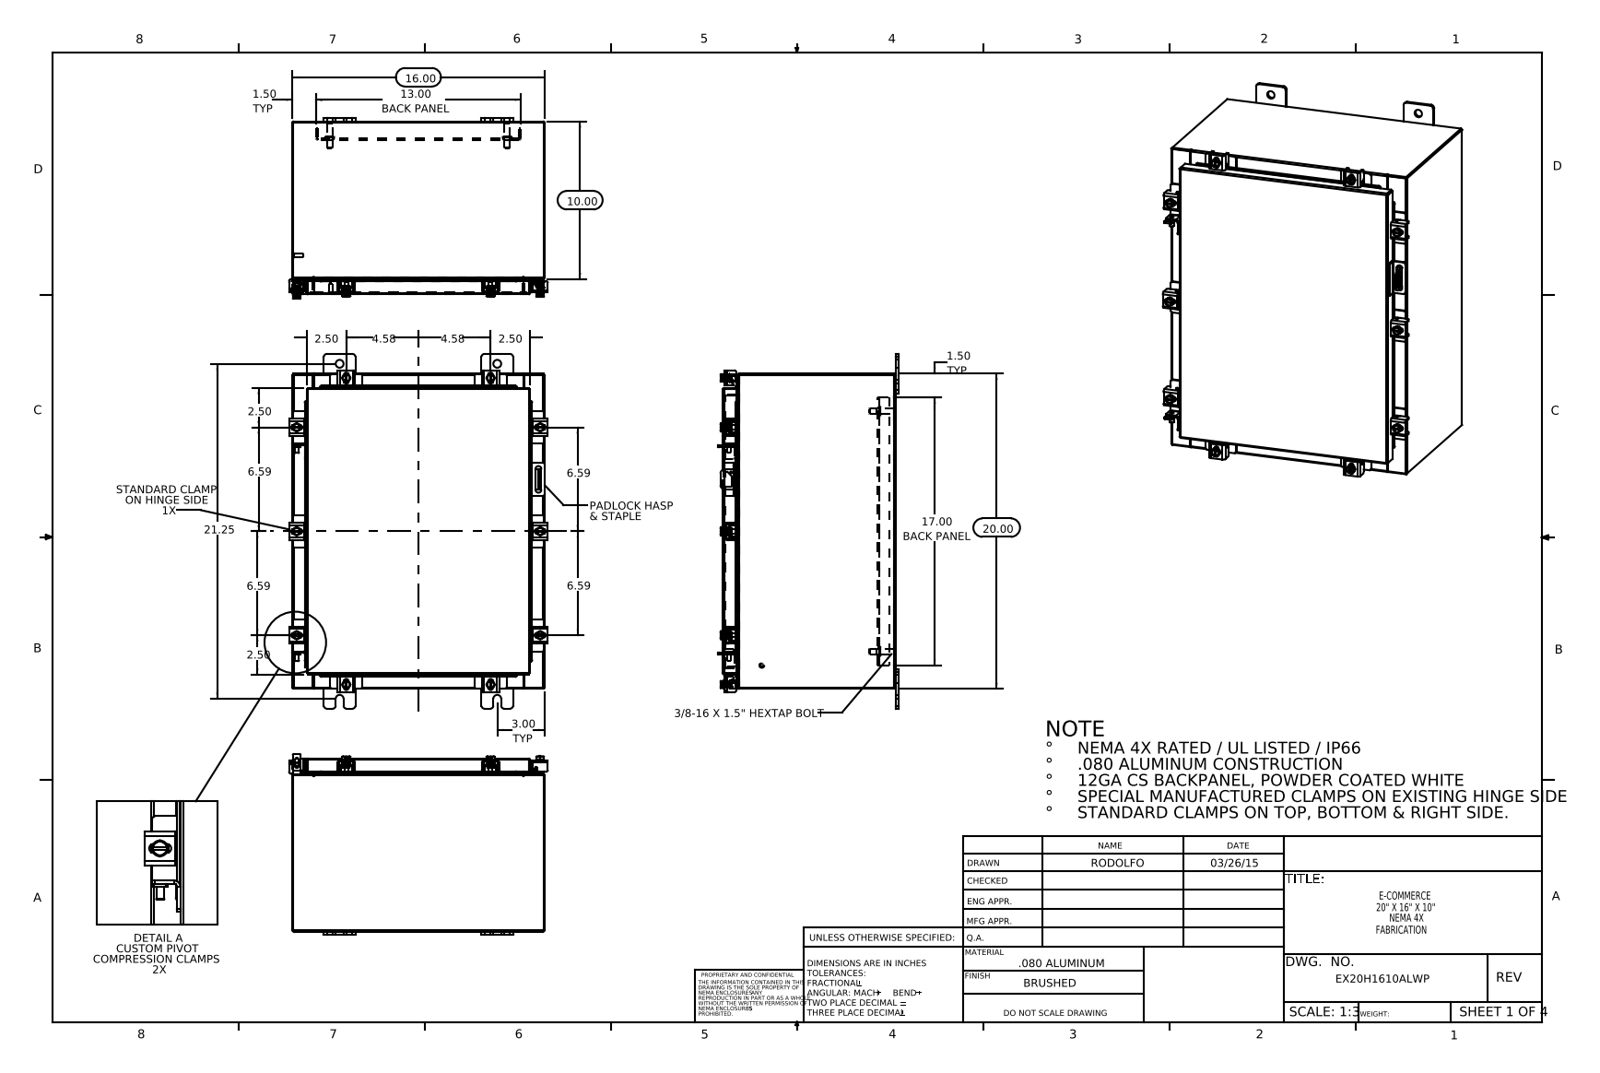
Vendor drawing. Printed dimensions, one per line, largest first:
21.25
20.00
17.00 BACK PANEL
16.00
13.00 BACK PANEL
10.00
6.59
6.59
6.59
6.59
4.58
4.58
3.00 TYP
2.50
2.50
2.50
2.50
1.50 TYP
1.50 TYP
